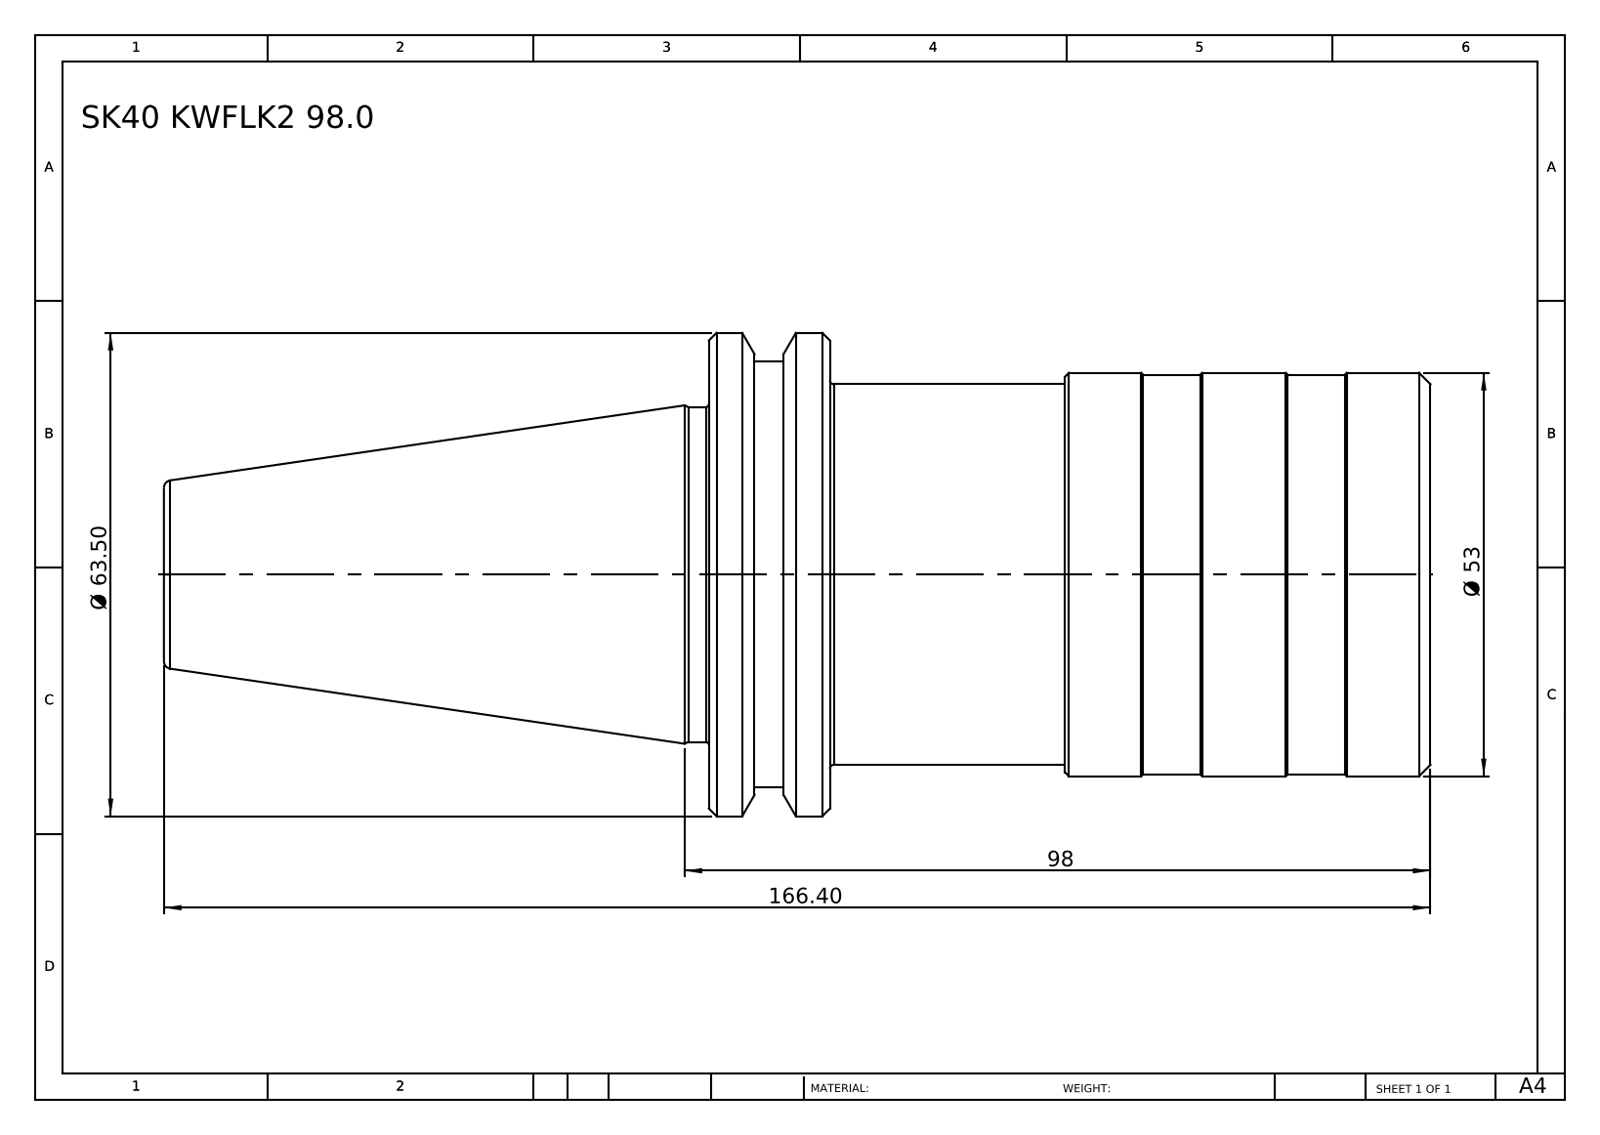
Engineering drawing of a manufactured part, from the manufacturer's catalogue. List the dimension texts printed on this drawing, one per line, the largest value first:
166.40
98
Ø 63.50
Ø 53
